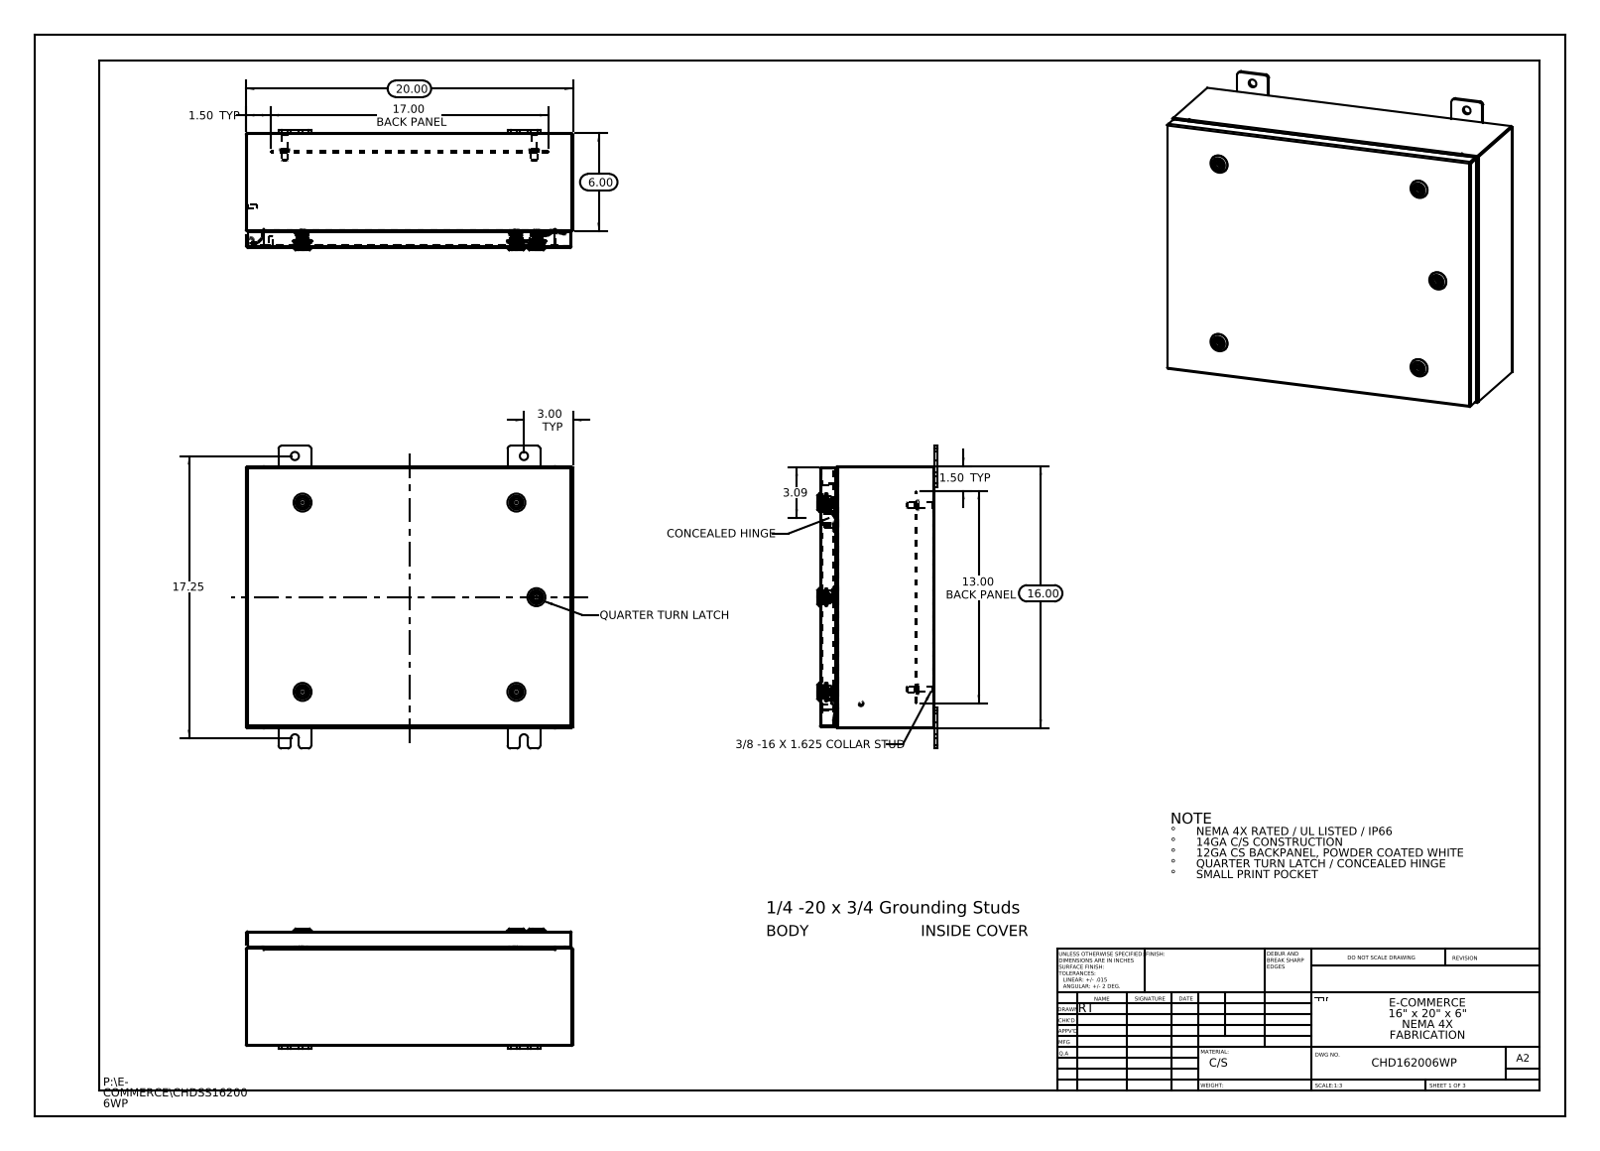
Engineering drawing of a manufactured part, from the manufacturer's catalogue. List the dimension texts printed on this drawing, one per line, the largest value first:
20.00
17.25
17.00 BACK PANEL
16.00
13.00 BACK PANEL
6.00
3.09
3.00 TYP
1.50 TYP
1.50 TYP
